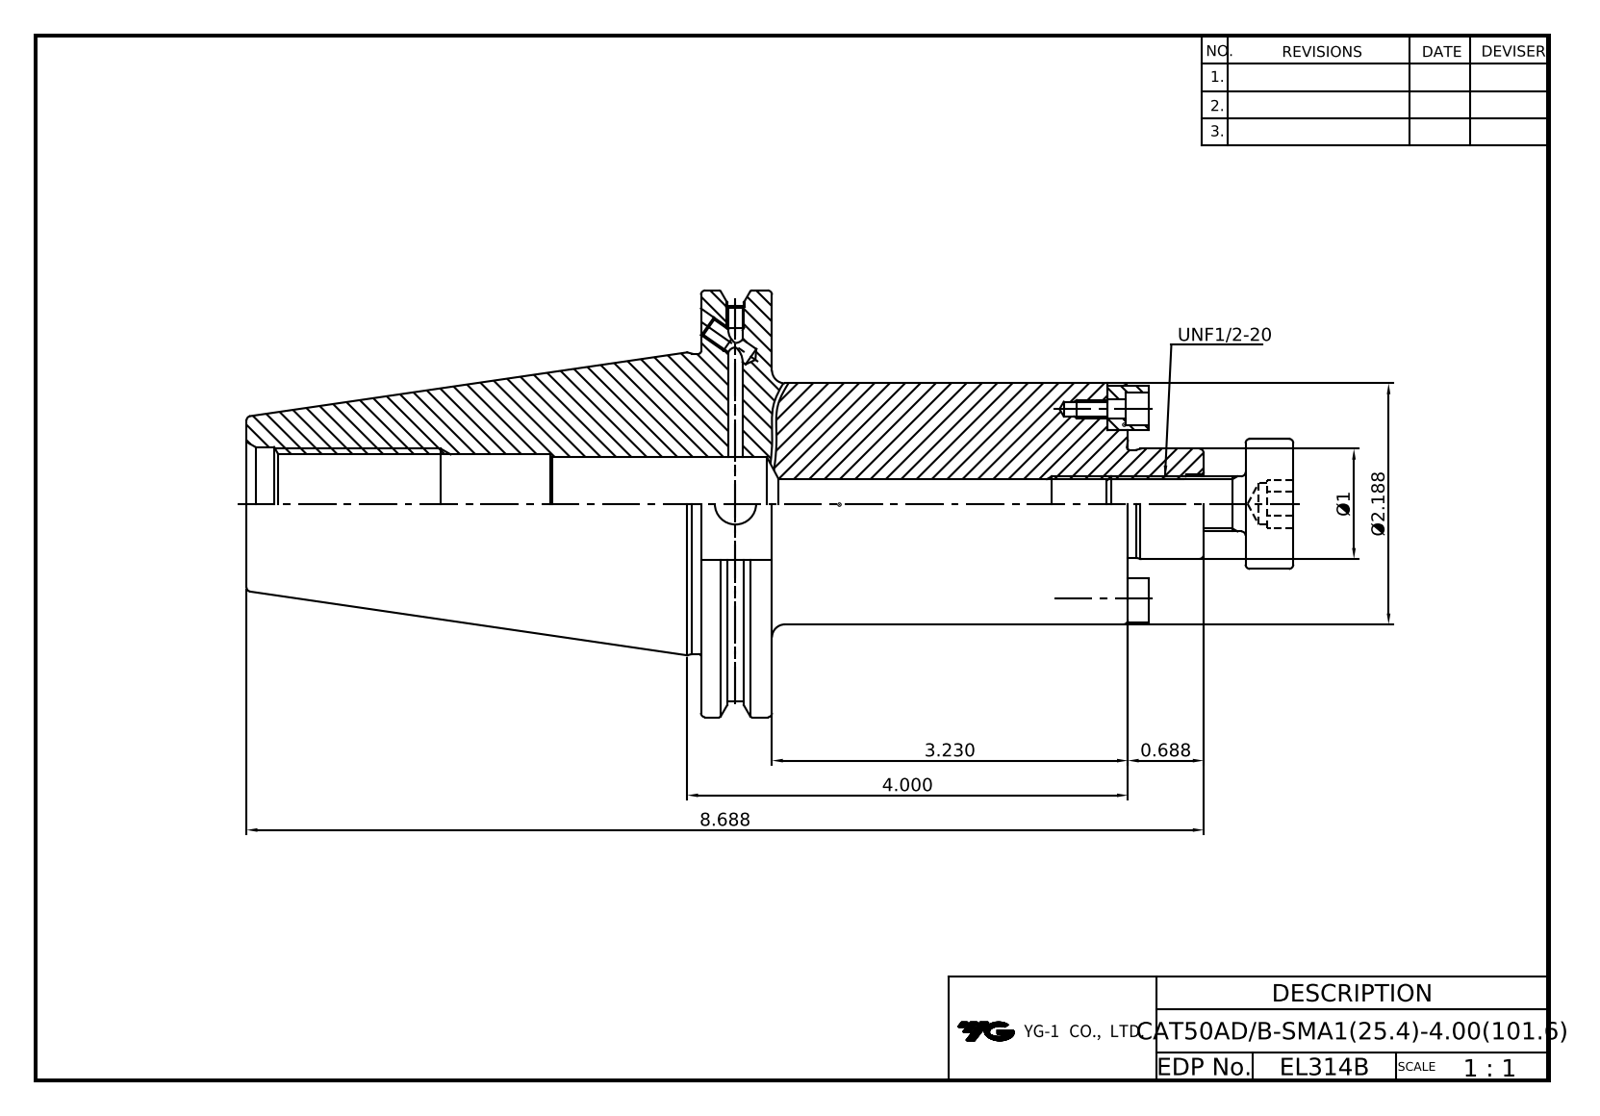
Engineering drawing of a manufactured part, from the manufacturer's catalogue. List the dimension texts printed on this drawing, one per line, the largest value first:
8.688
4.000
3.230
Ø2.188
Ø1
0.688
